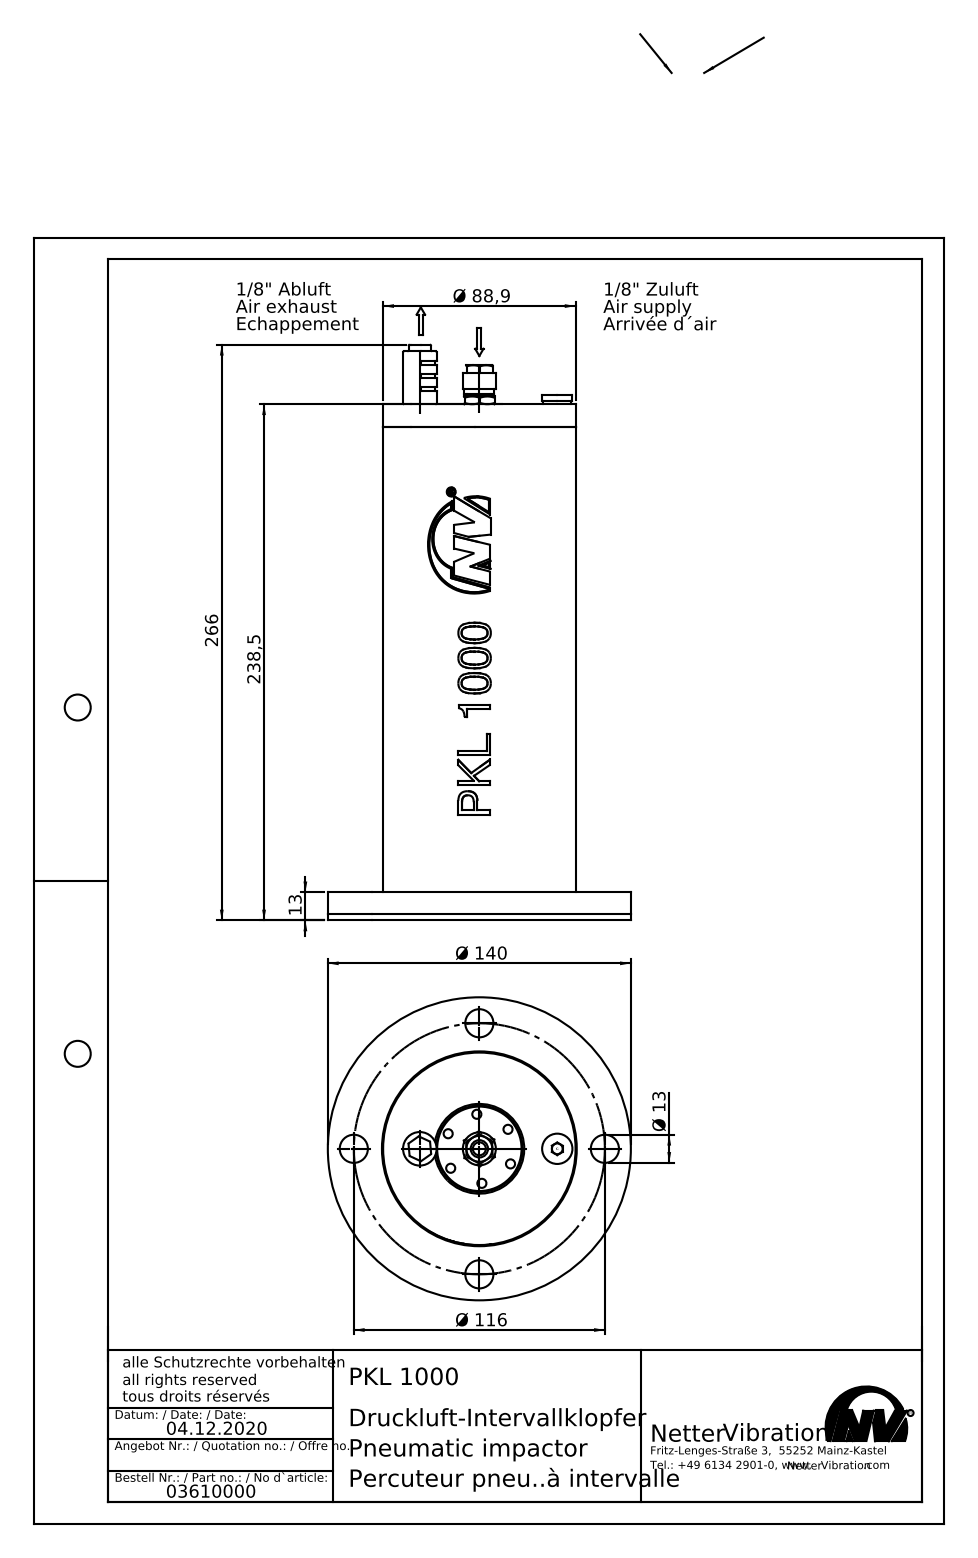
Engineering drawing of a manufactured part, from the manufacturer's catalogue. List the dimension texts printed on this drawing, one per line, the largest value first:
266
238,5
Ø 140
Ø 116
Ø 88,9
13
Ø 13
